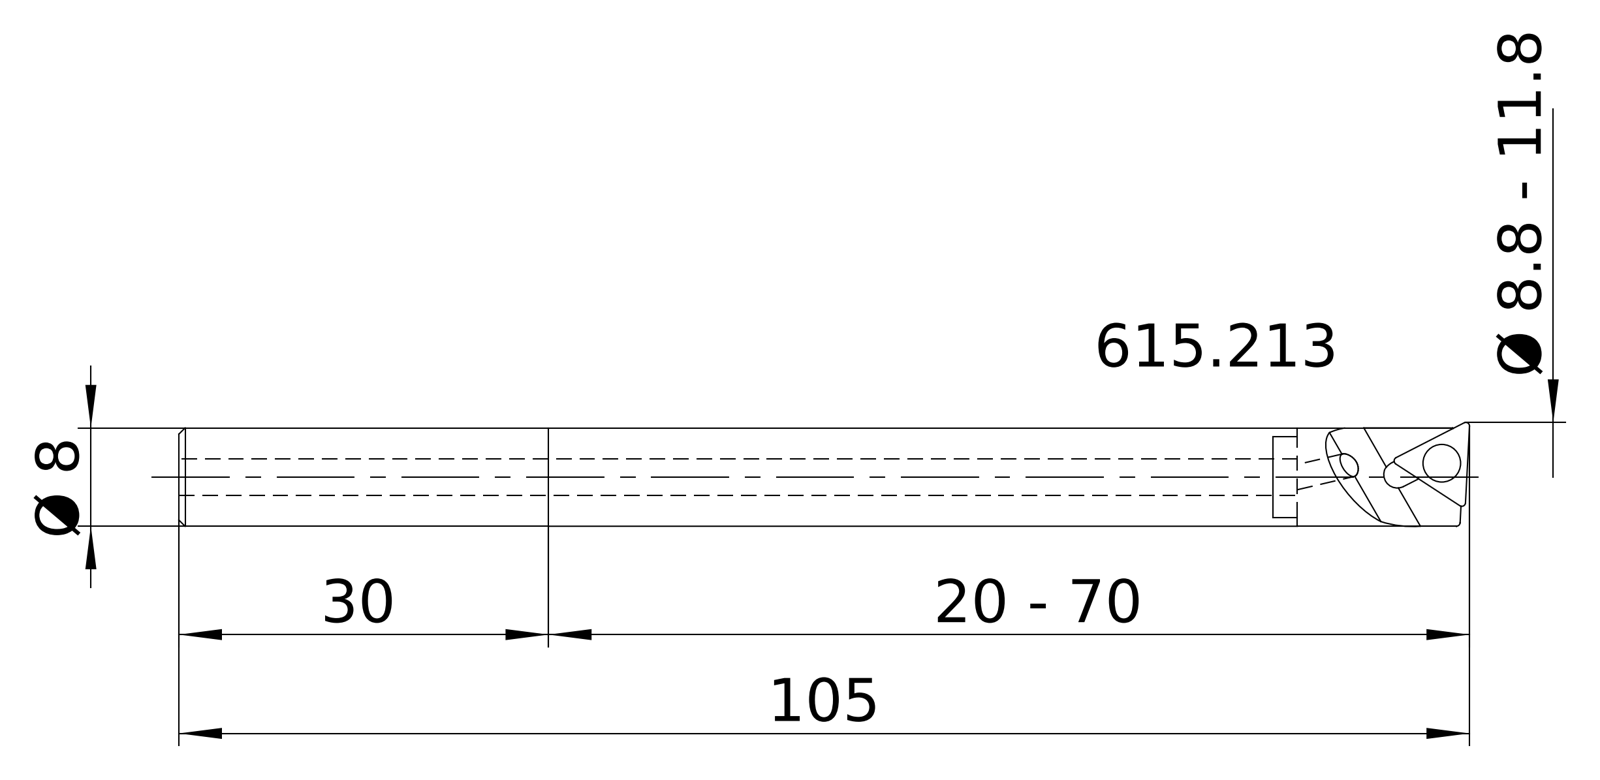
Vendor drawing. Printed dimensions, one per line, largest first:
105
30
20 - 70
Ø 8.8 - 11.8
Ø 8
